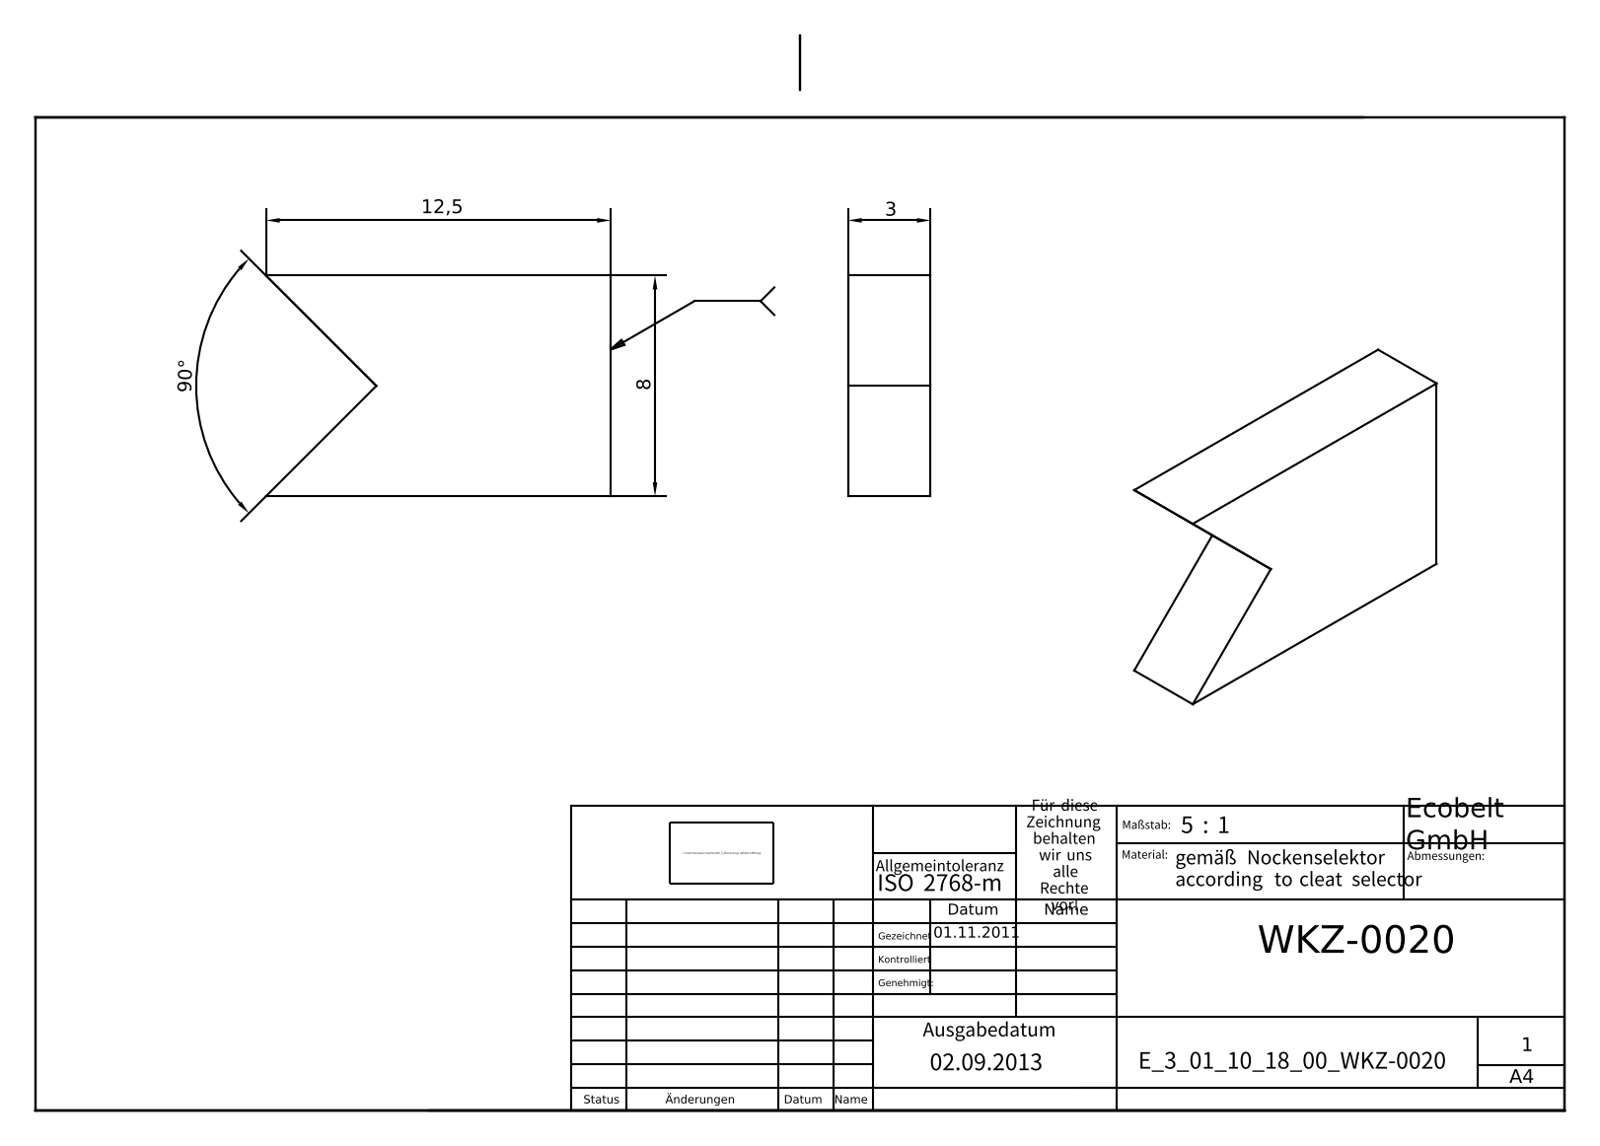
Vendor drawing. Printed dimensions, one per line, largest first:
90°
12,5
8
3
